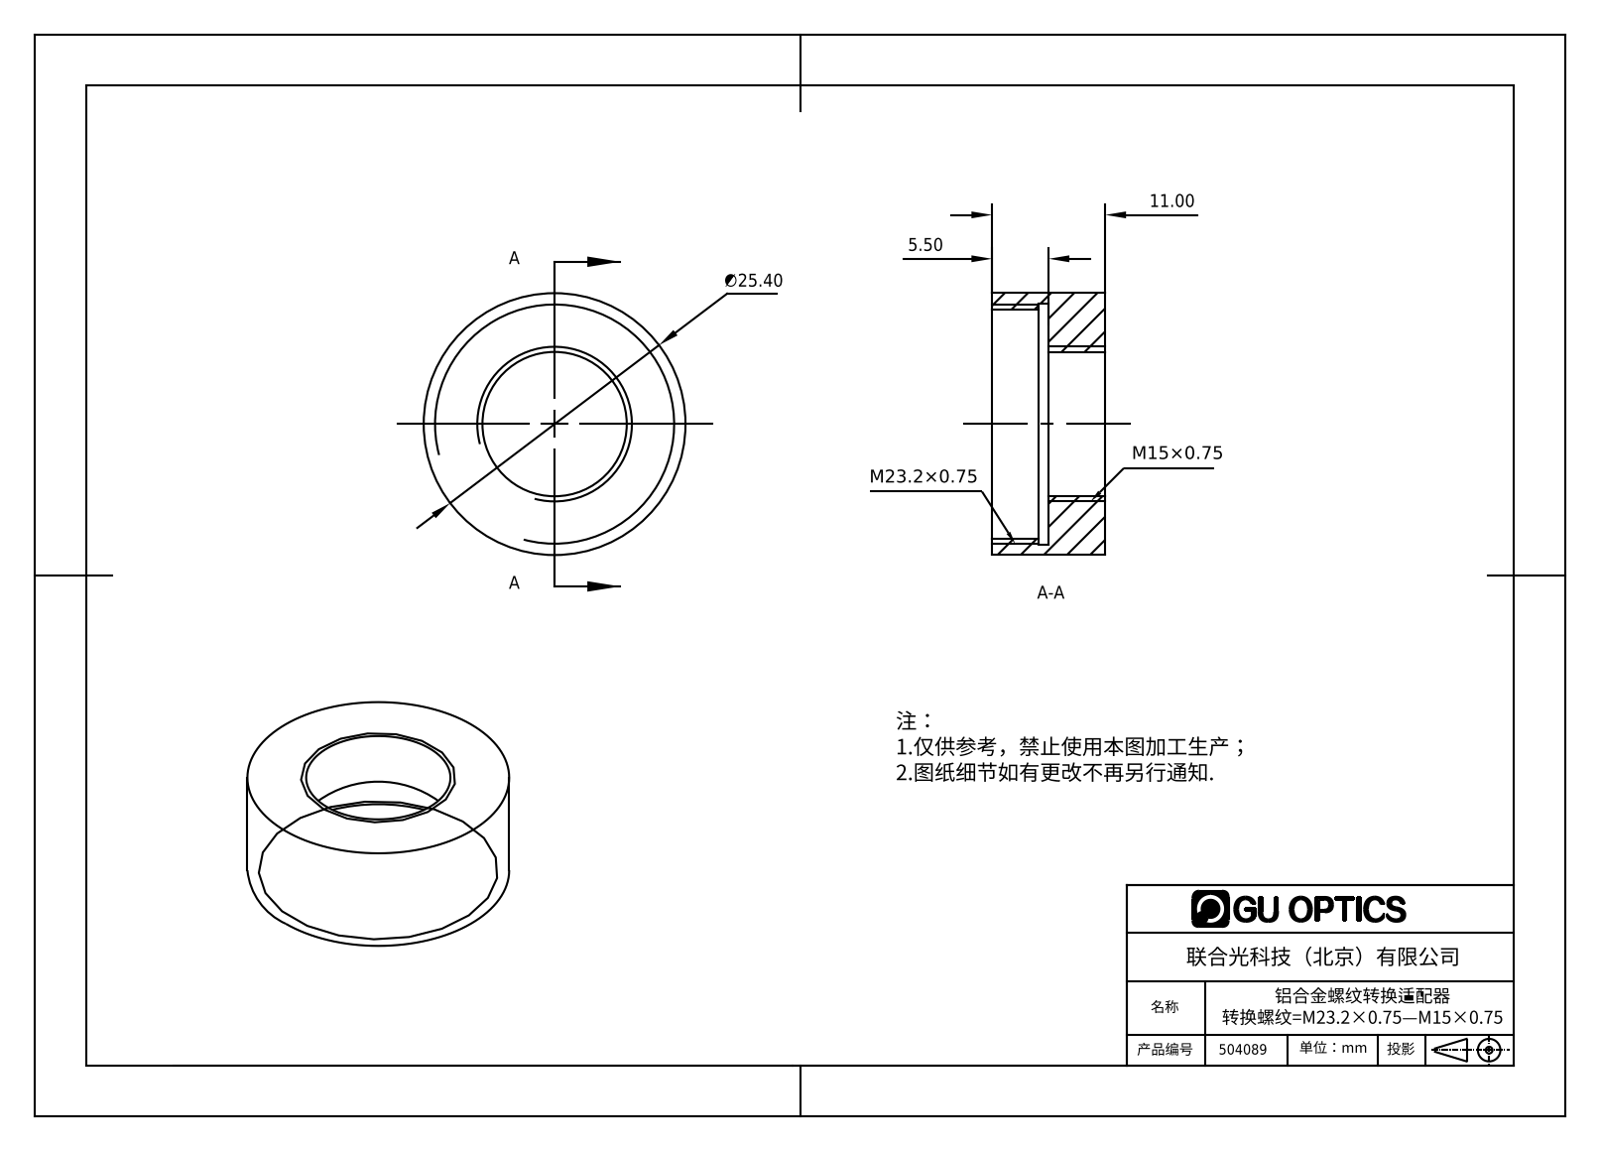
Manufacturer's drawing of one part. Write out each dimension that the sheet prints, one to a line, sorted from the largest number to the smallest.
∅25.40
11.00
5.50
